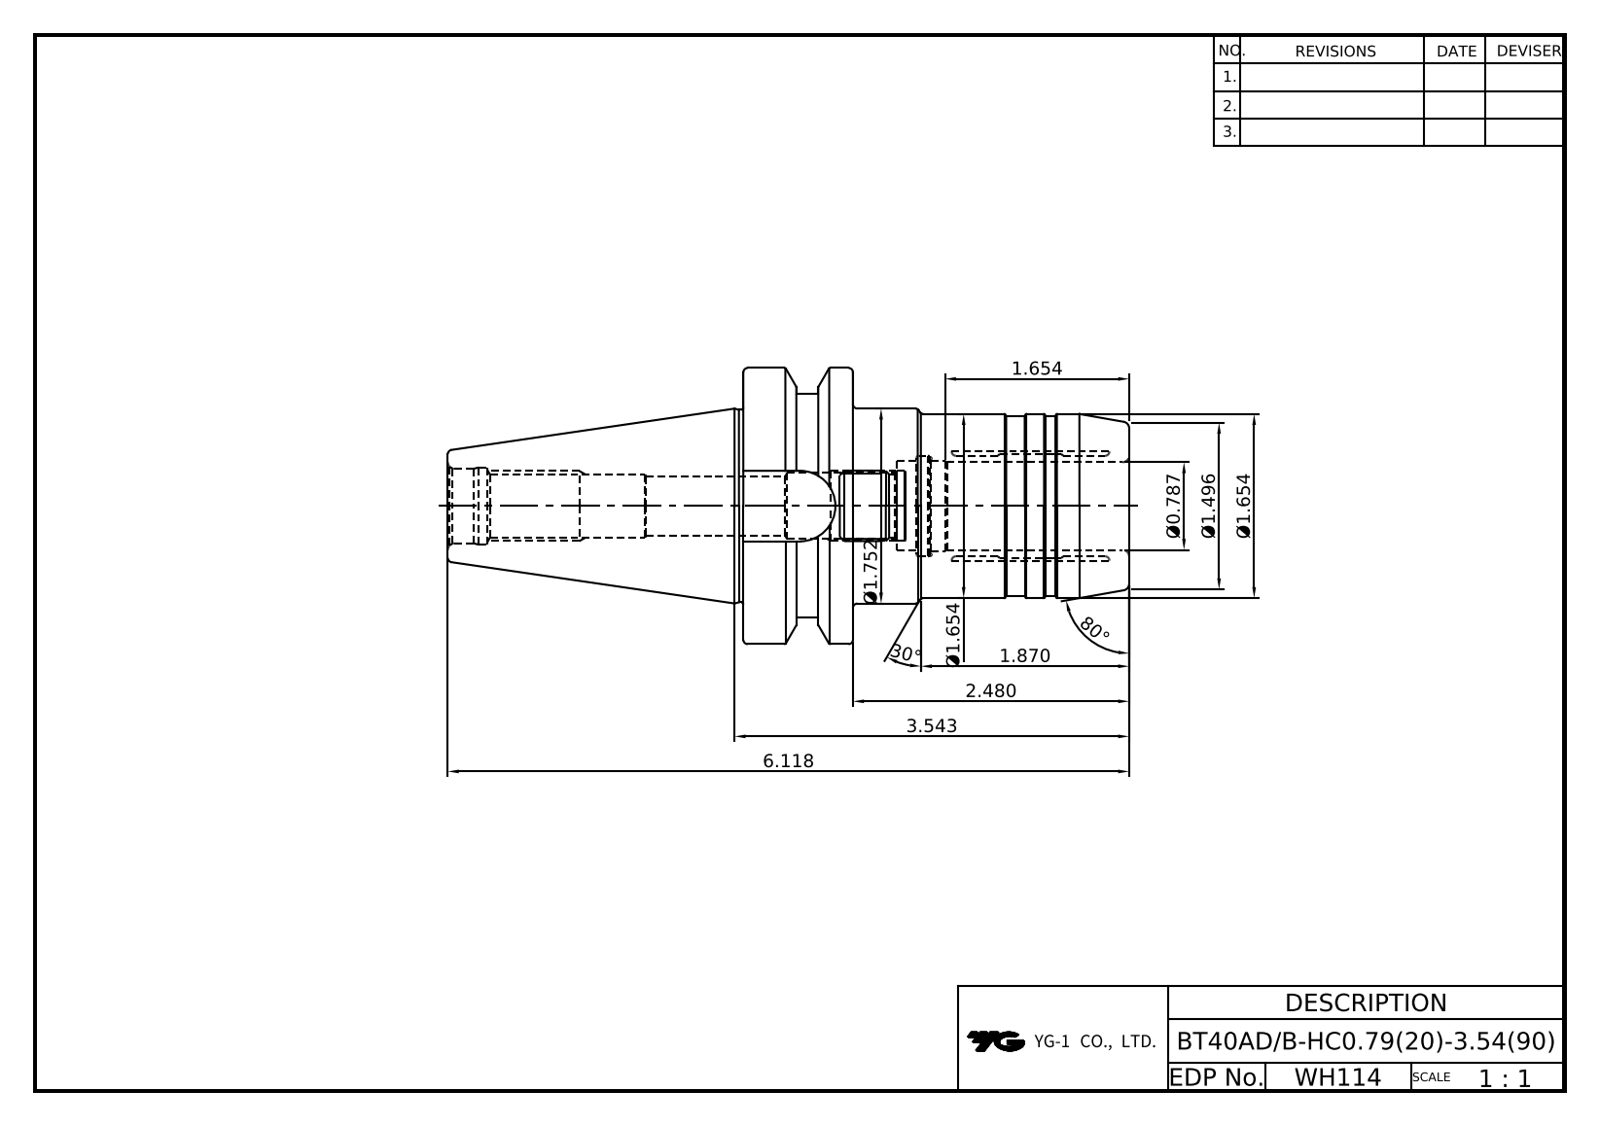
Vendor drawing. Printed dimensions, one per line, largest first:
80°
30°
6.118
3.543
2.480
1.870
Ø1.752
Ø1.654
Ø1.654
1.654
Ø1.496
Ø0.787
